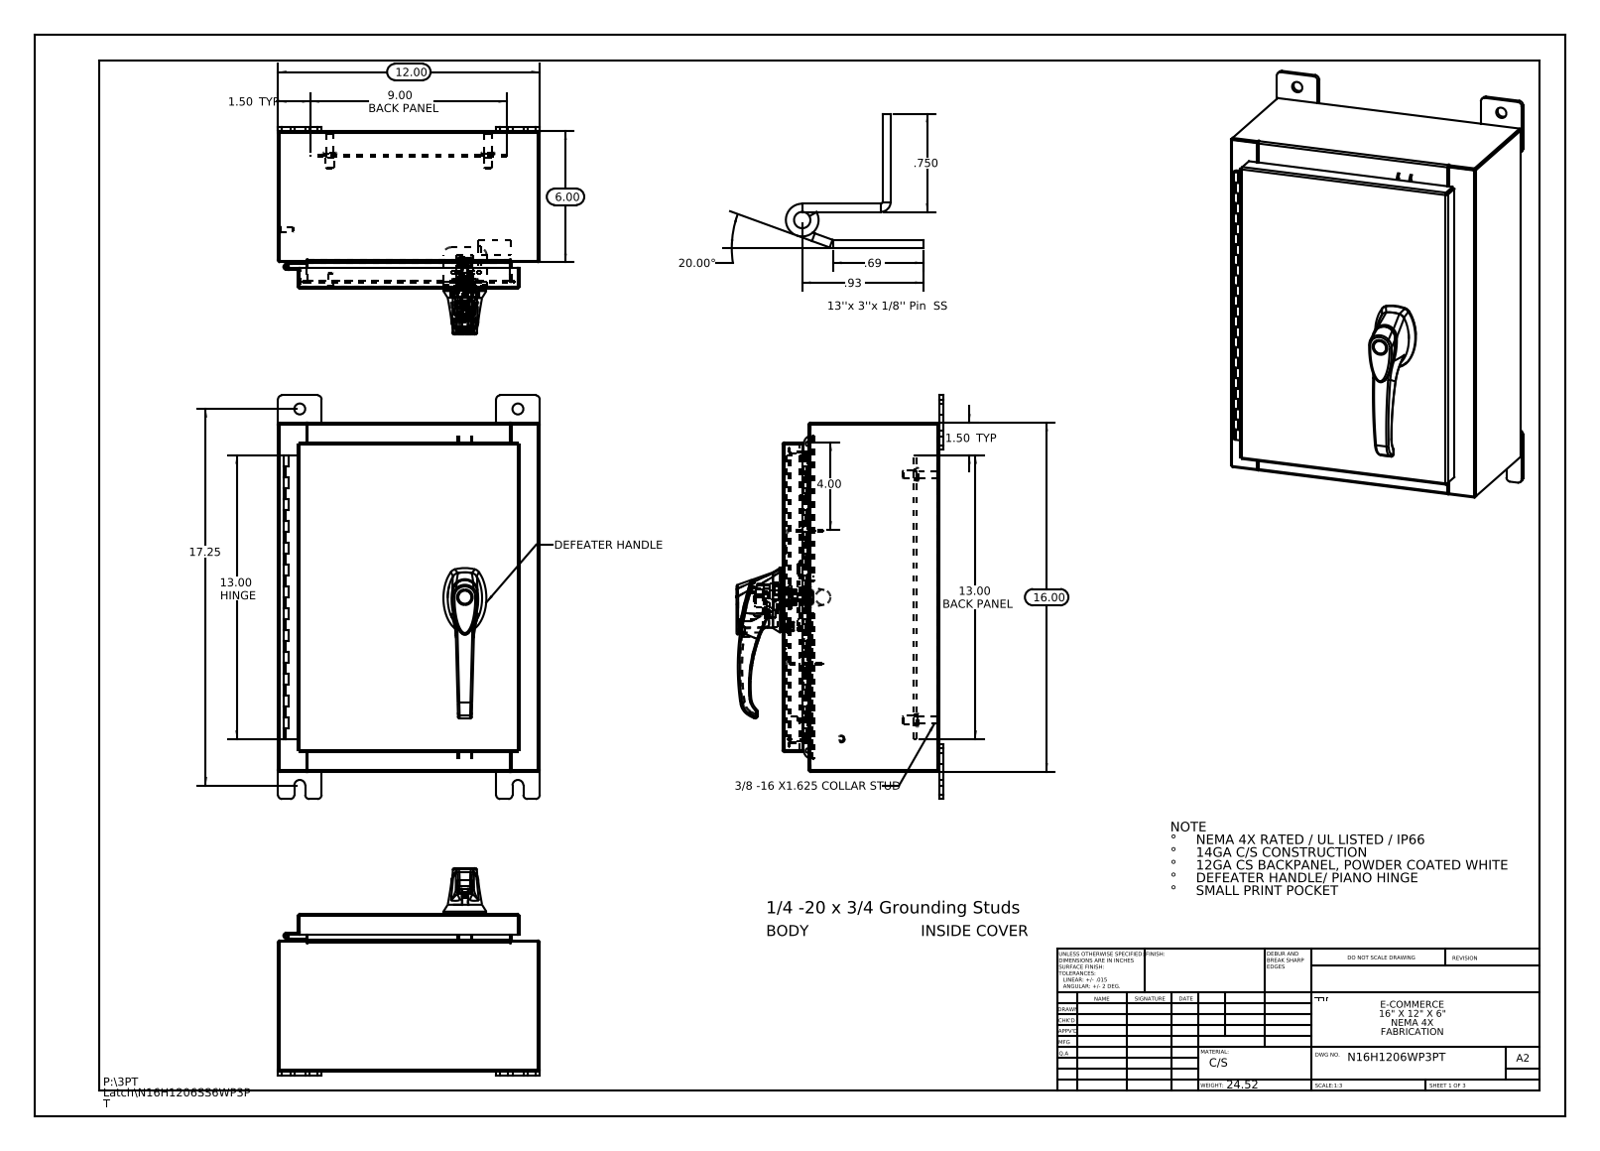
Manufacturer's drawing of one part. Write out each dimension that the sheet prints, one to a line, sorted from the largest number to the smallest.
20.00°
17.25
16.00
13.00 HINGE
13.00 BACK PANEL
12.00
9.00 BACK PANEL
6.00
4.00
1.50 TYP
1.50 TYP
.93
.750
.69
